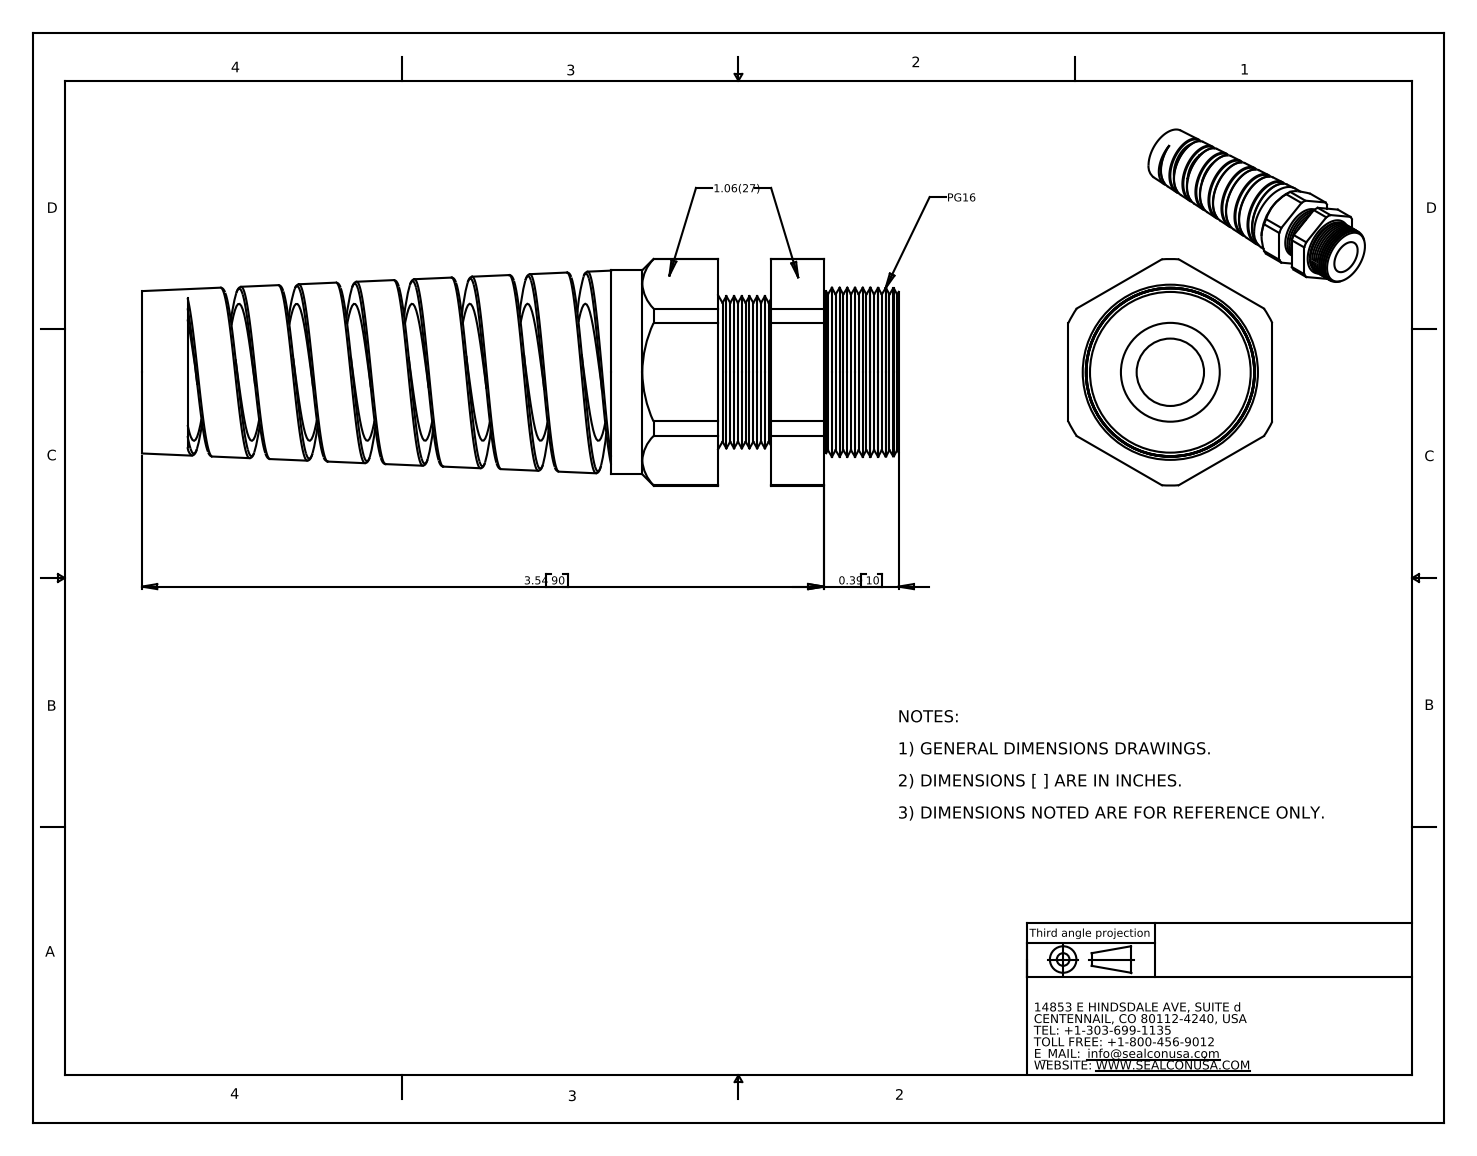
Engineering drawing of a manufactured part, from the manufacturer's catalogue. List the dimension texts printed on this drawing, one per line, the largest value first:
3.54 90
0.39 10
